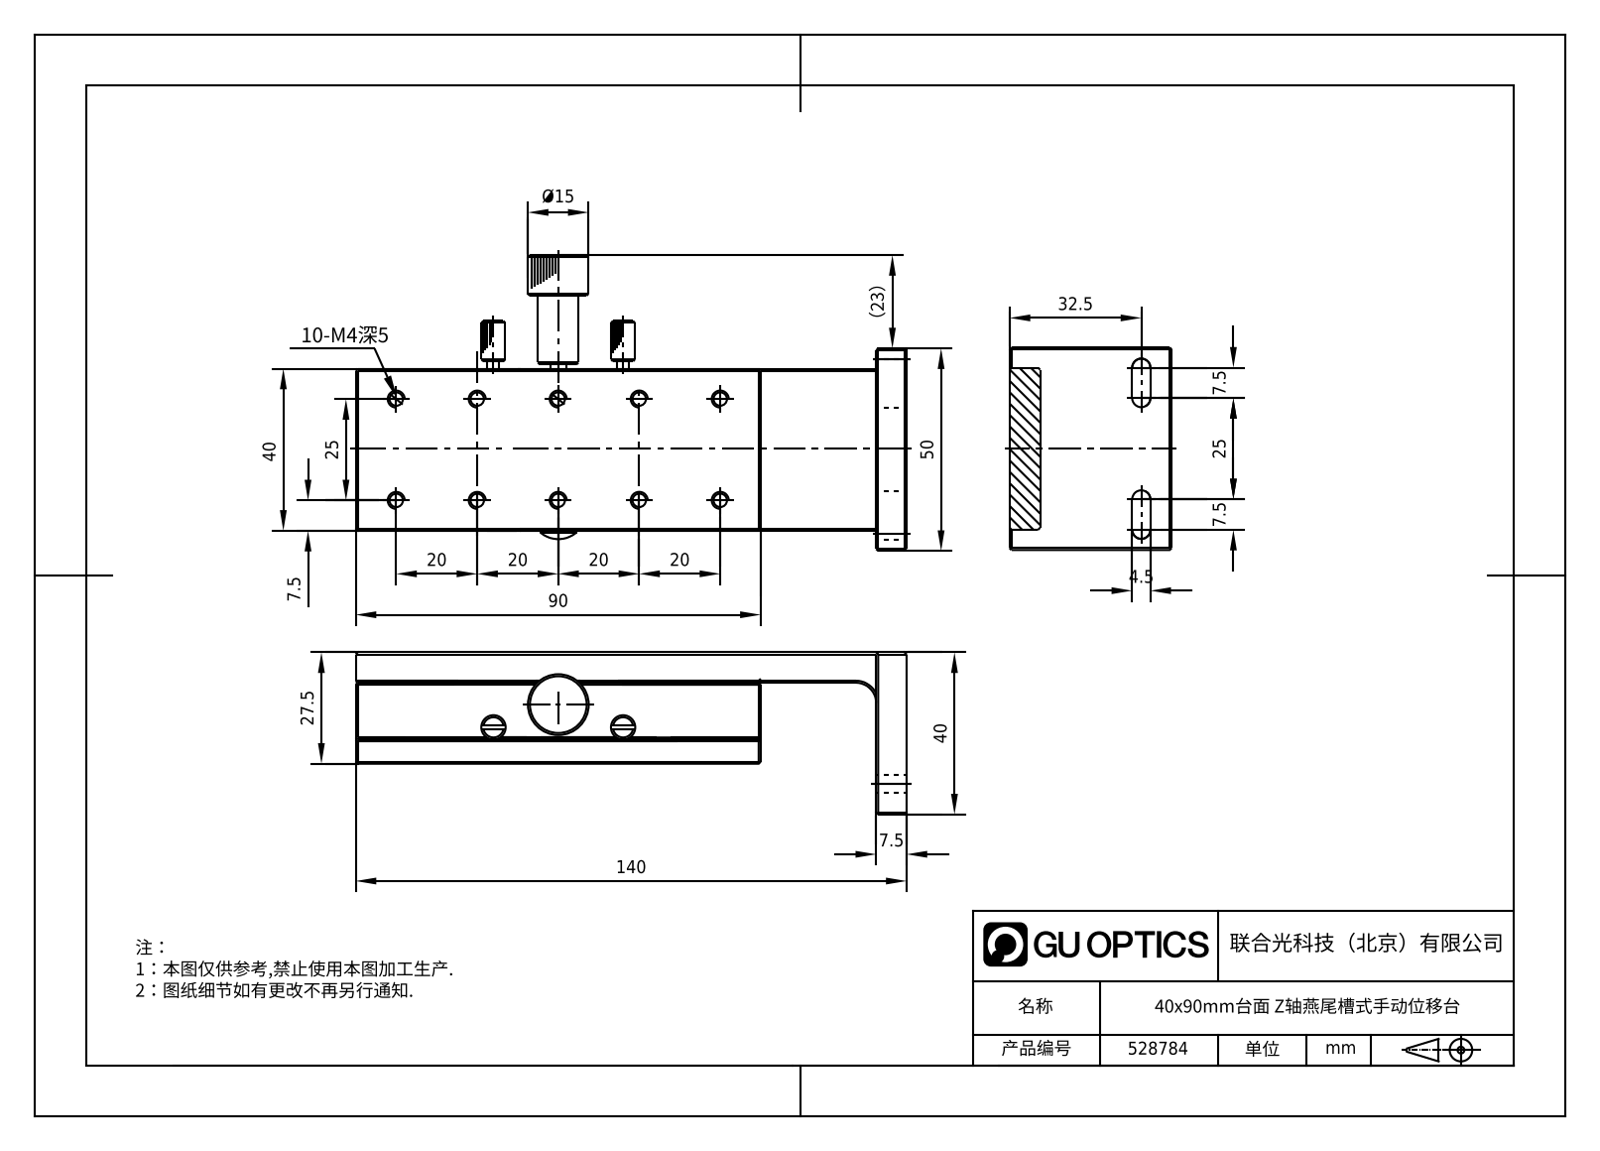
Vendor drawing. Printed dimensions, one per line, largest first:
140
90
50
40
40
32.5
27.5
25
25
（23）
20
20
20
20
Ø15
7.5
7.5
7.5
7.5
4.5
